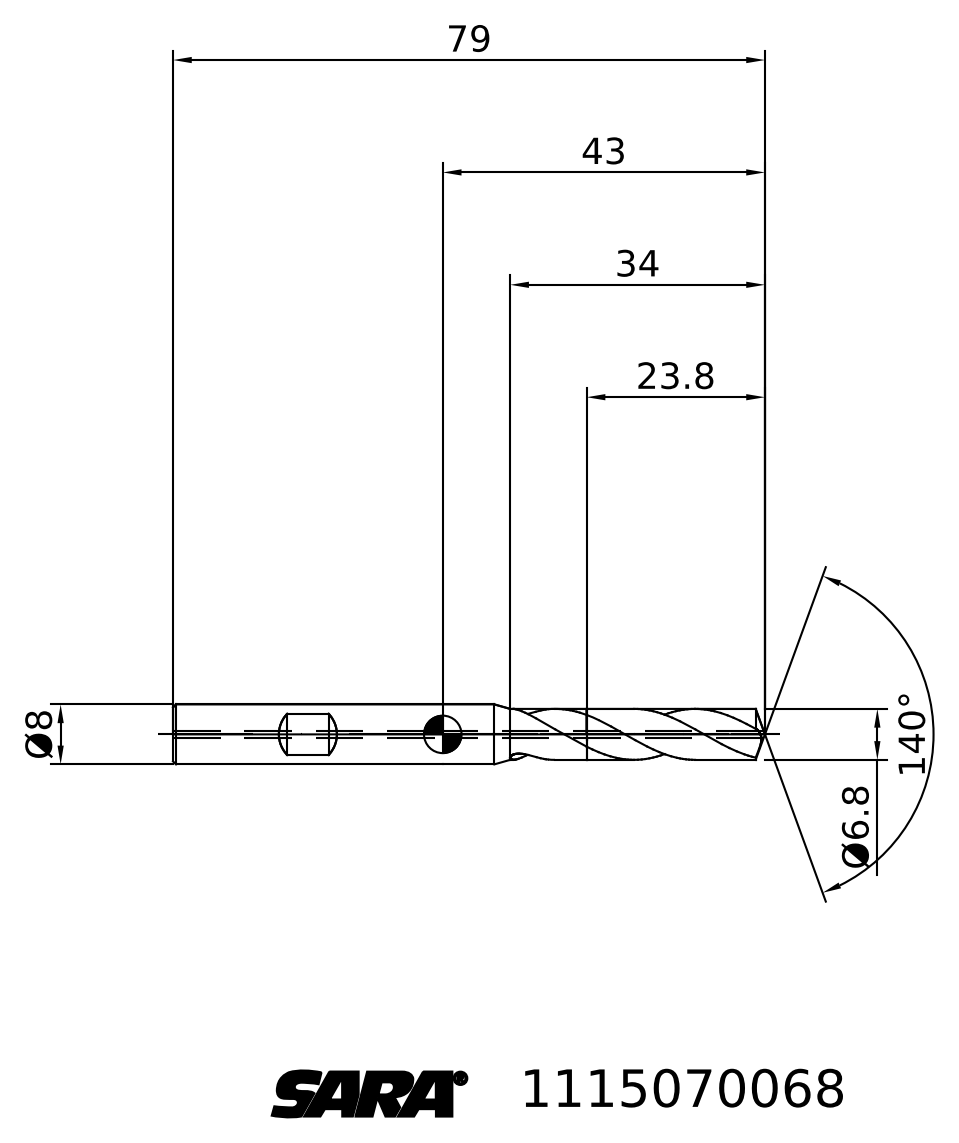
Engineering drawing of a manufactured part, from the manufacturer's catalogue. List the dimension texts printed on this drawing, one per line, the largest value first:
140°
79
43
34
23.8
Ø8
Ø6.8
